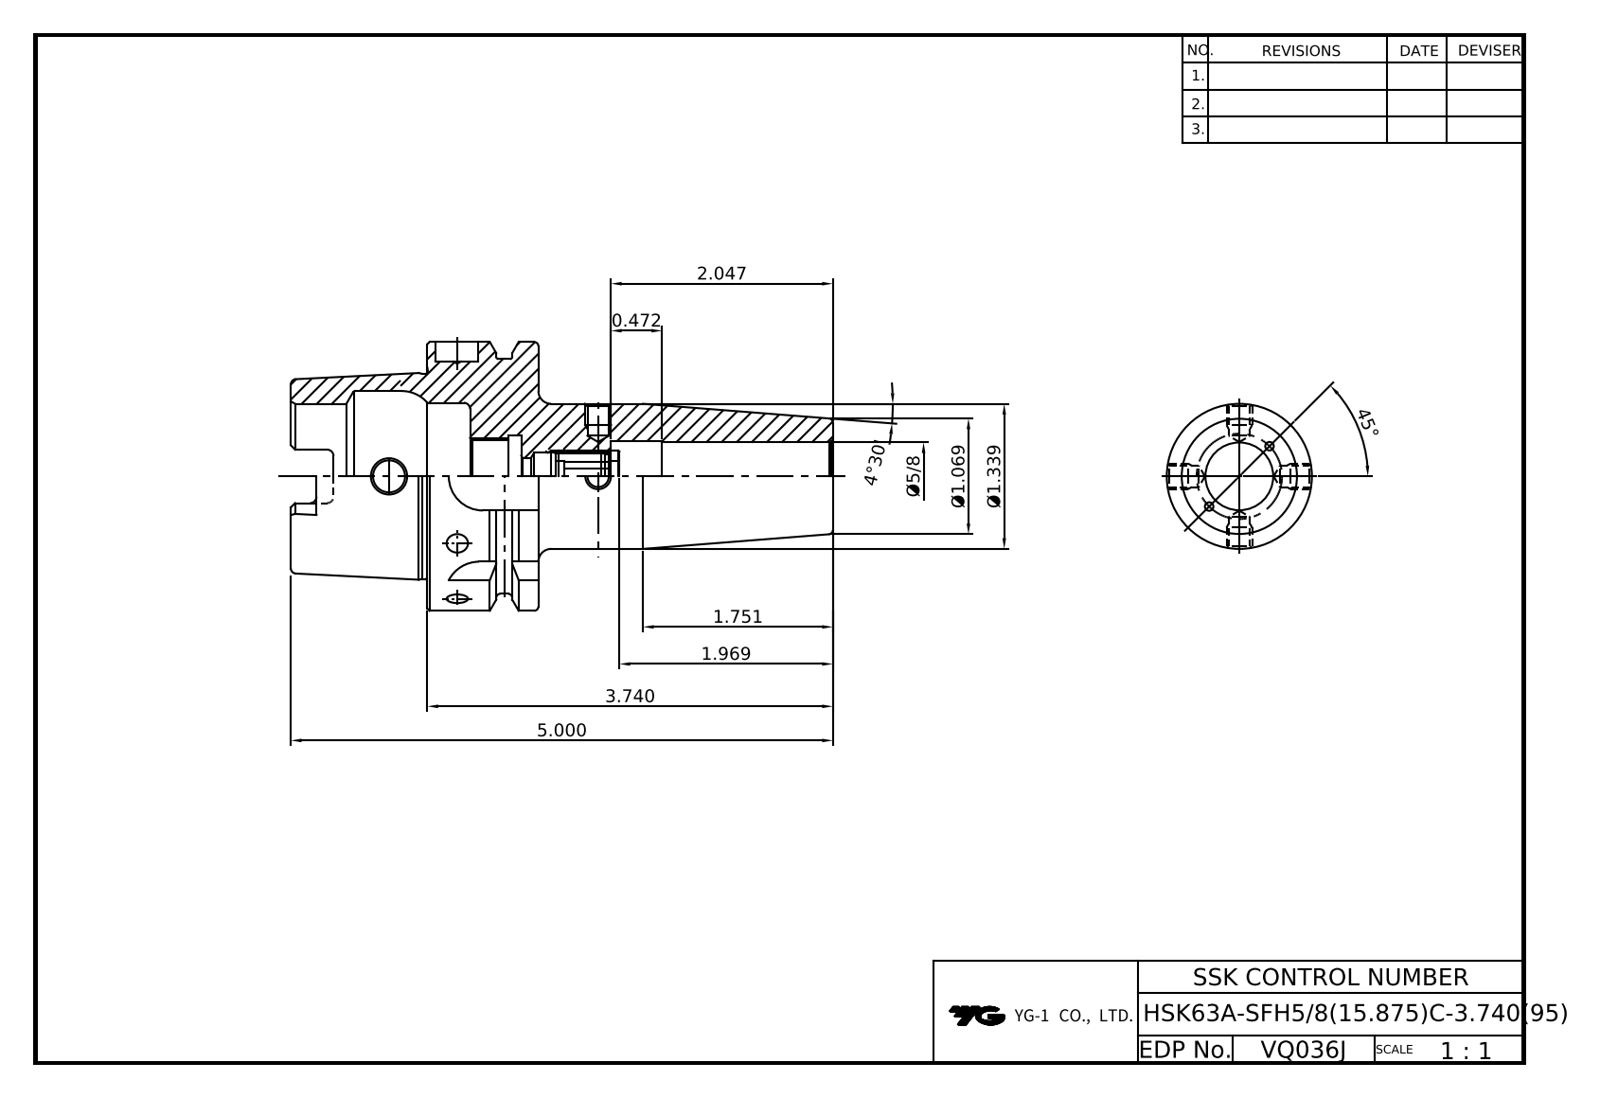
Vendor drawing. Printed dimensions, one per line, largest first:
45°
5.000
4°30'
3.740
2.047
1.969
1.751
Ø1.339
Ø1.069
0.472
